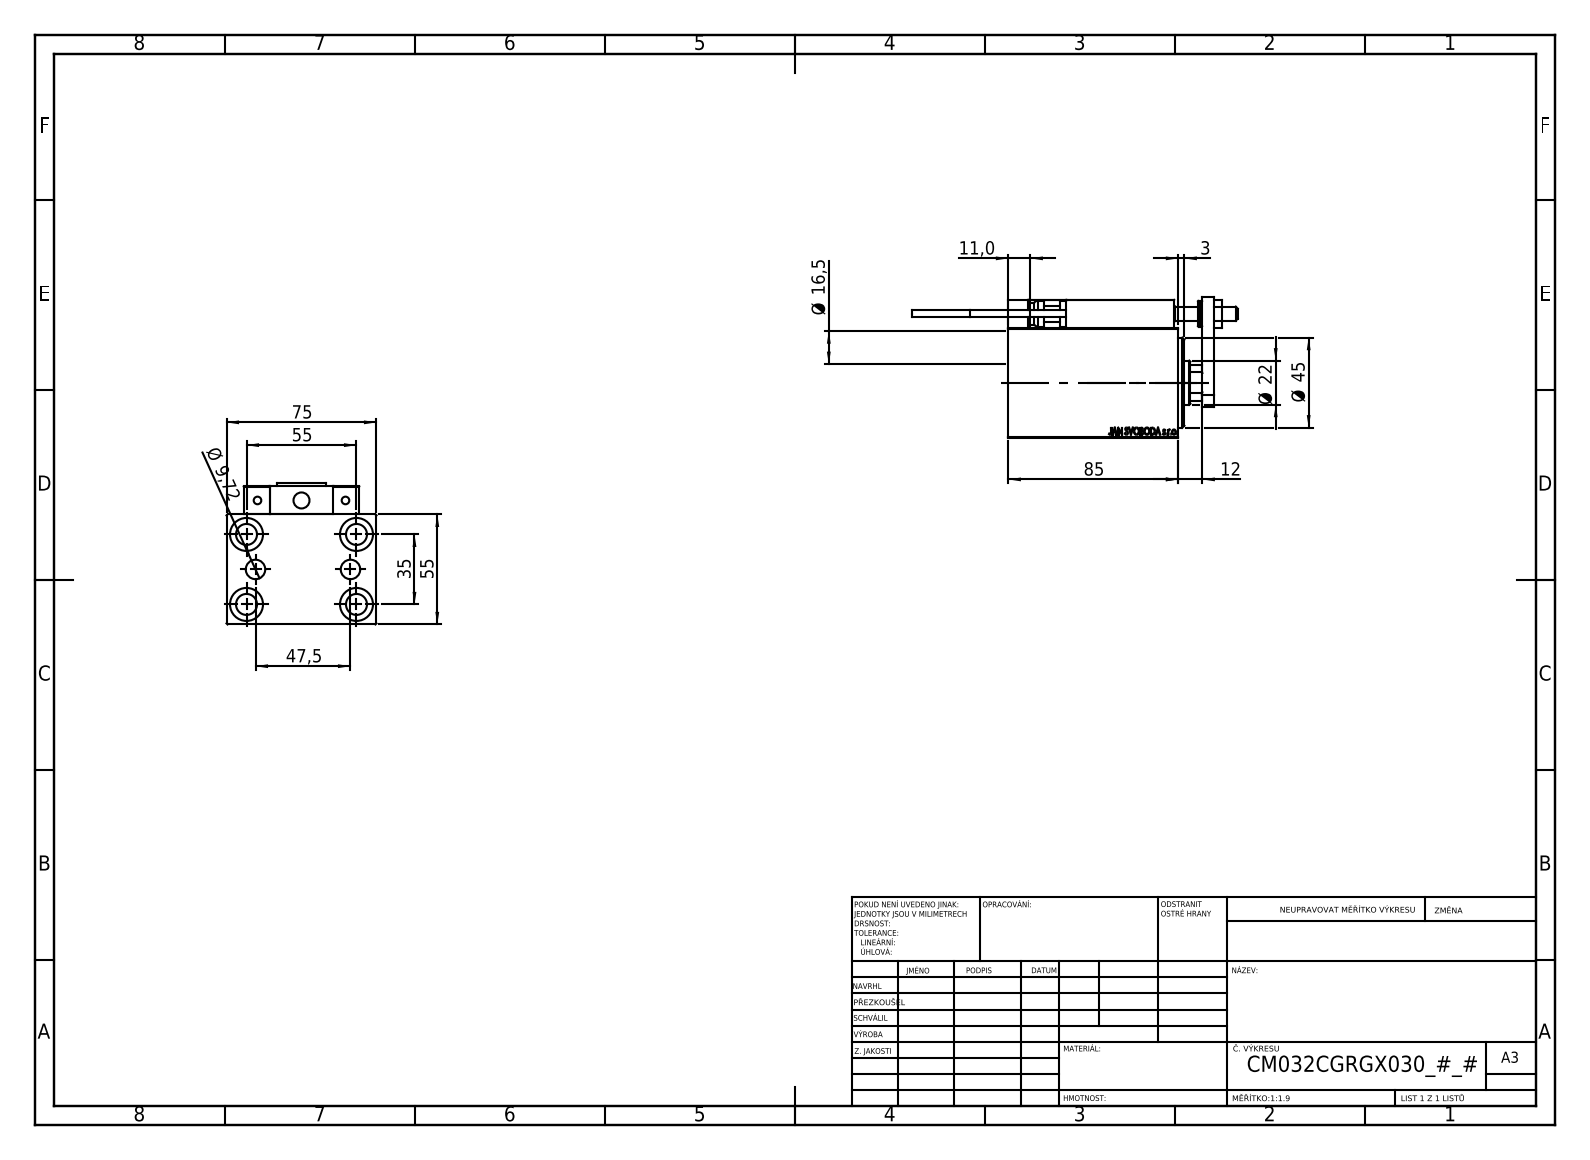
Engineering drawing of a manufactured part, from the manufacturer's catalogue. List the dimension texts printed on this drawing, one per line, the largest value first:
85
75
55
55
47,5
Ø 45
35
Ø 22
Ø 16,5
12
11,0
Ø 9,72
3
